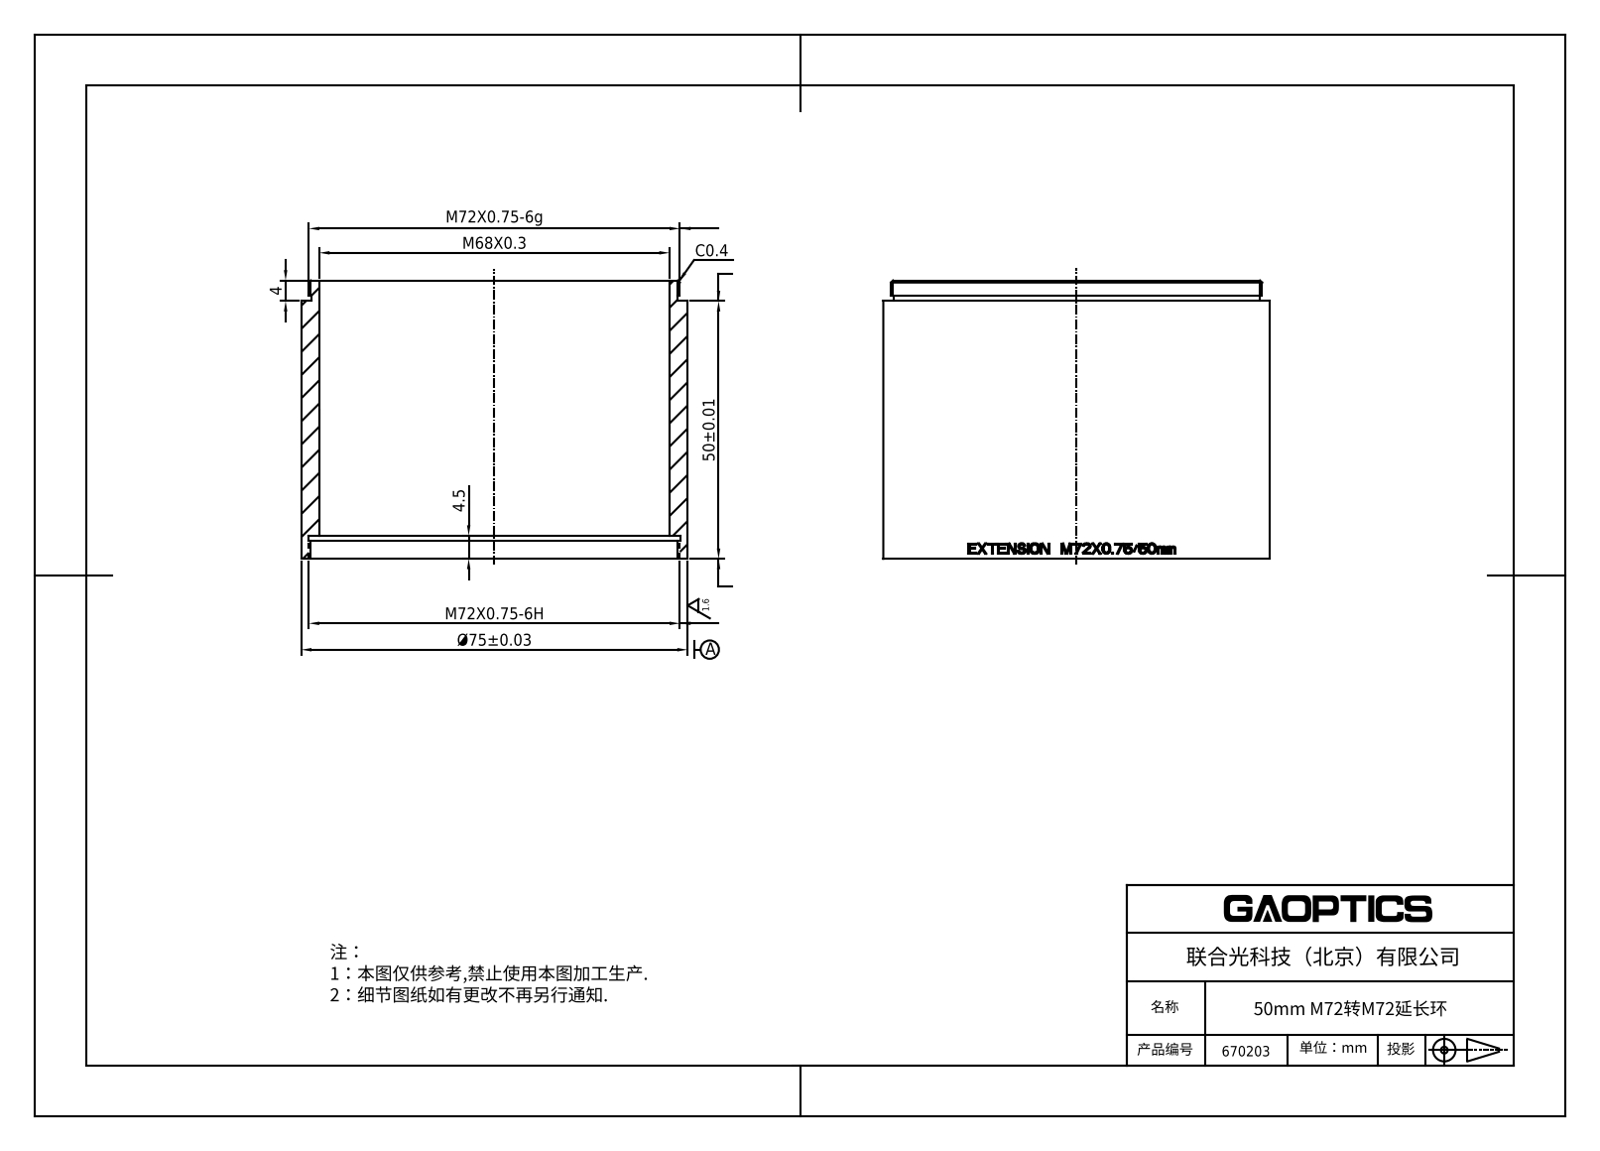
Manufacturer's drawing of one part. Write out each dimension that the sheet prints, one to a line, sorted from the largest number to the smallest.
Ø75±0.03
M72X0.75-6H
M72X0.75-6g
M68X0.3
50±0.01
4.5
4
